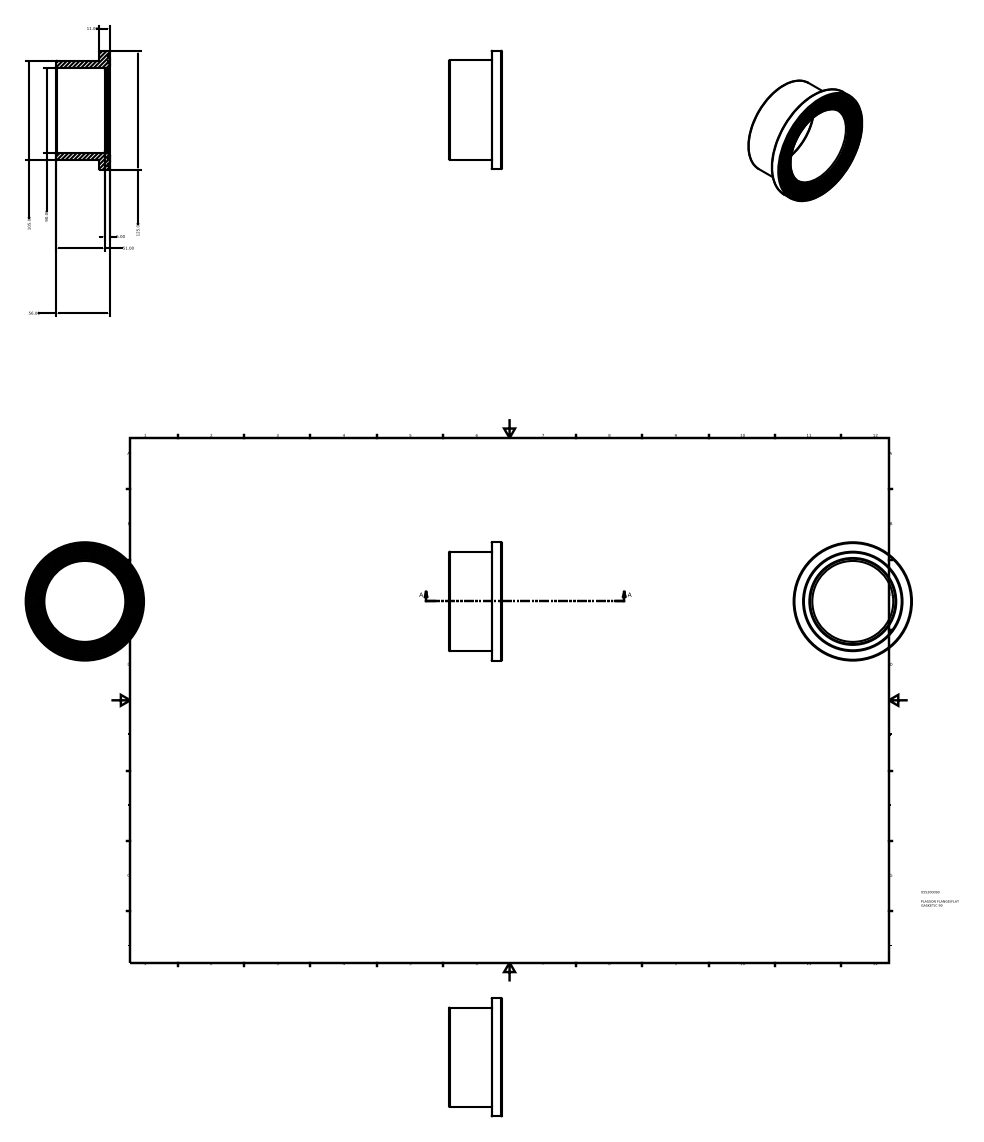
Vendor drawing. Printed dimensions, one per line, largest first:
125.00
105.00
90.00
56.00
51.00
11.00
5.00
